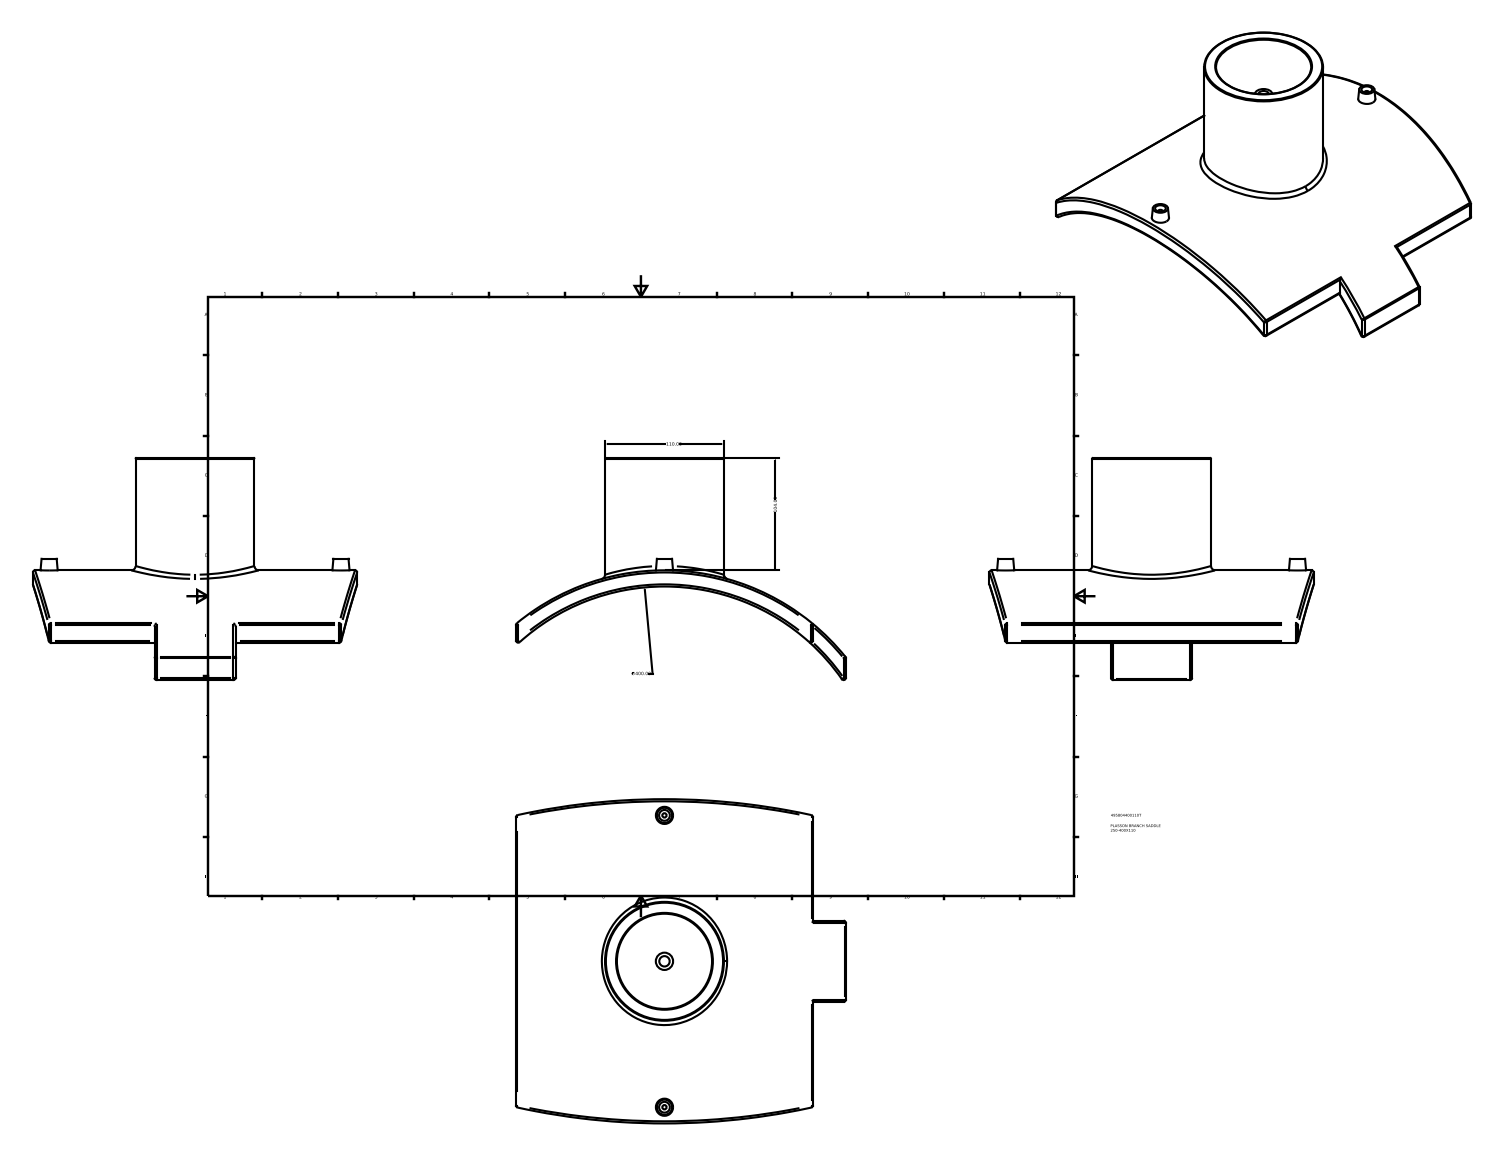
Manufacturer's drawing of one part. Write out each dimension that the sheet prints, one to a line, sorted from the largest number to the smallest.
∅400.00
110.00
104.00
